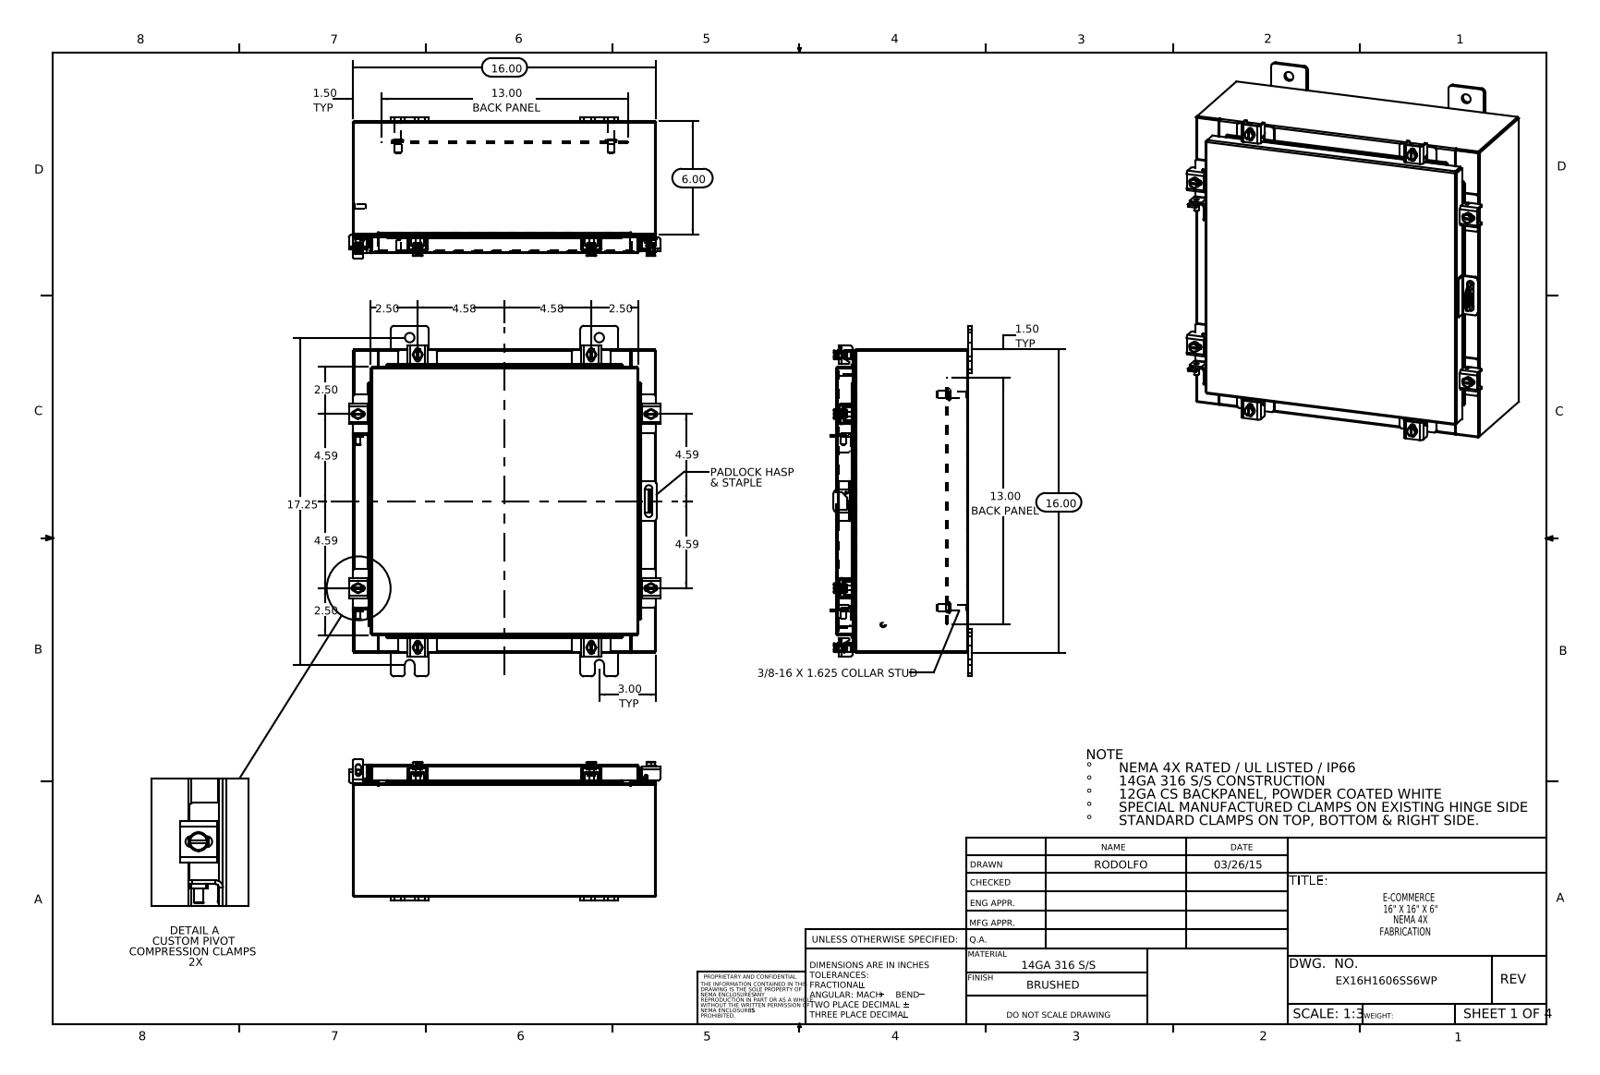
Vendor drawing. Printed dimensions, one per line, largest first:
17.25
16.00
16.00
13.00 BACK PANEL
13.00 BACK PANEL
6.00
4.59
4.59
4.59
4.59
4.58
4.58
3.00 TYP
2.50
2.50
2.50
2.50
1.50 TYP
1.50 TYP
